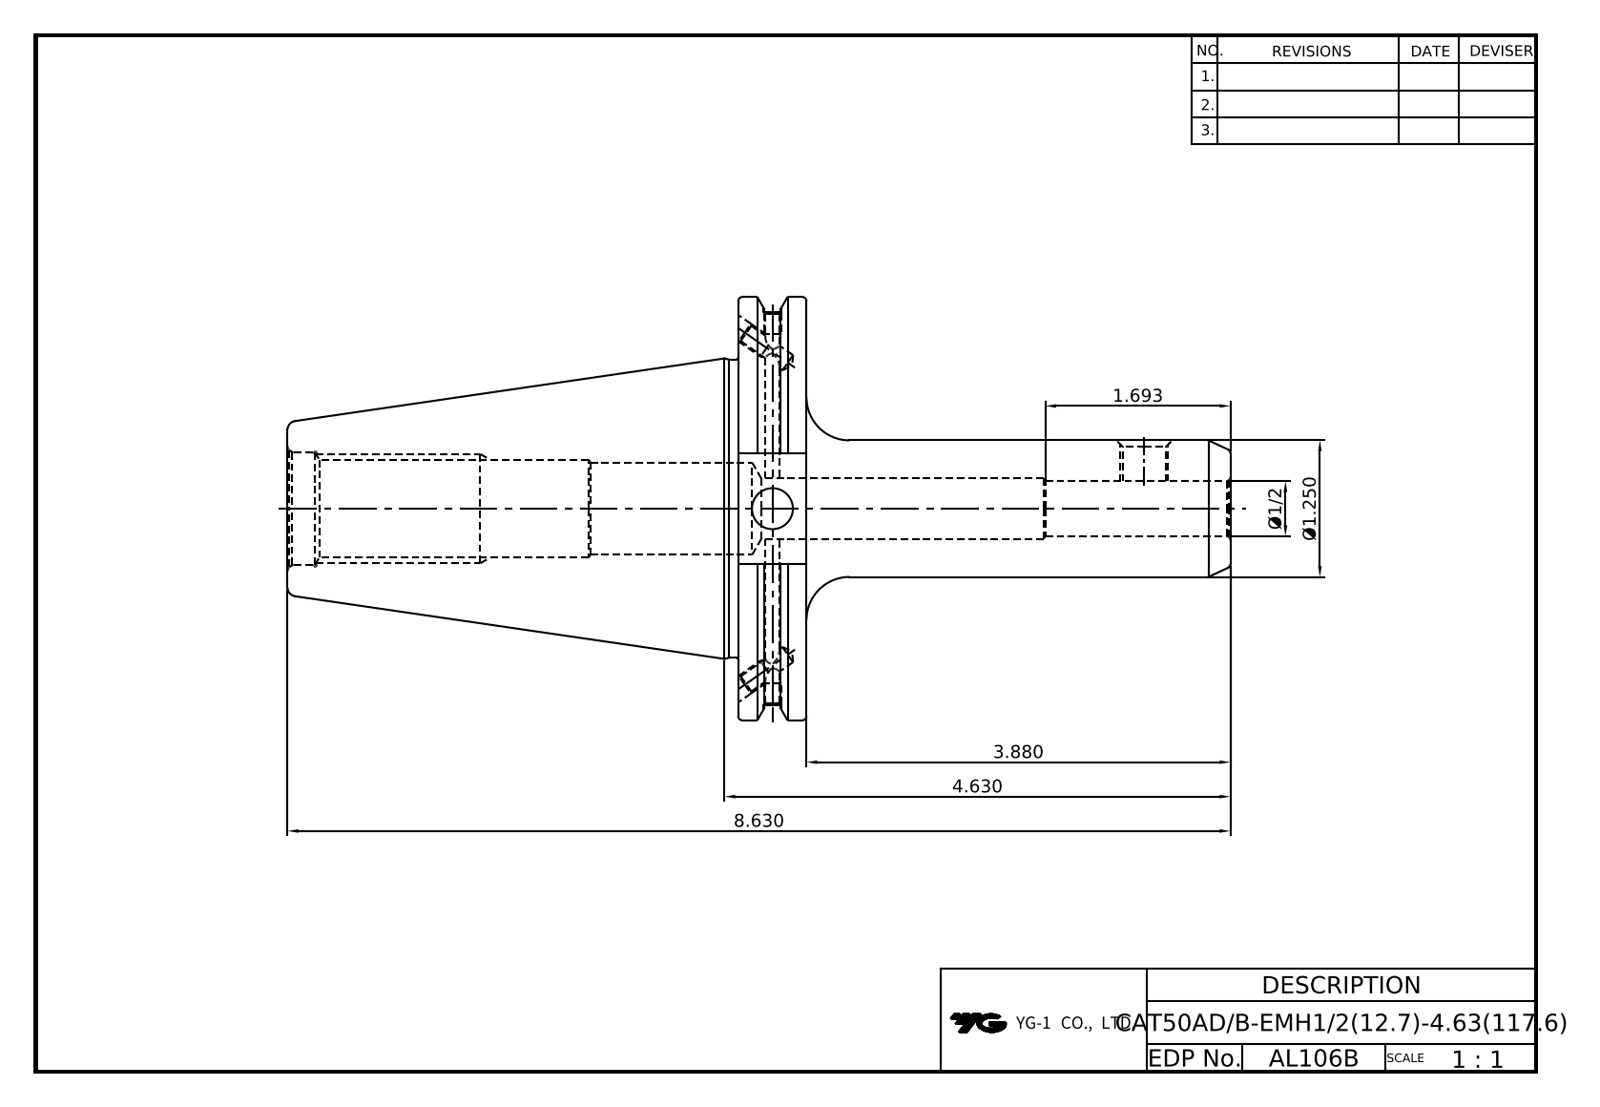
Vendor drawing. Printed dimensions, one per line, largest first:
8.630
4.630
3.880
1.693
Ø1.250
Ø1/2
